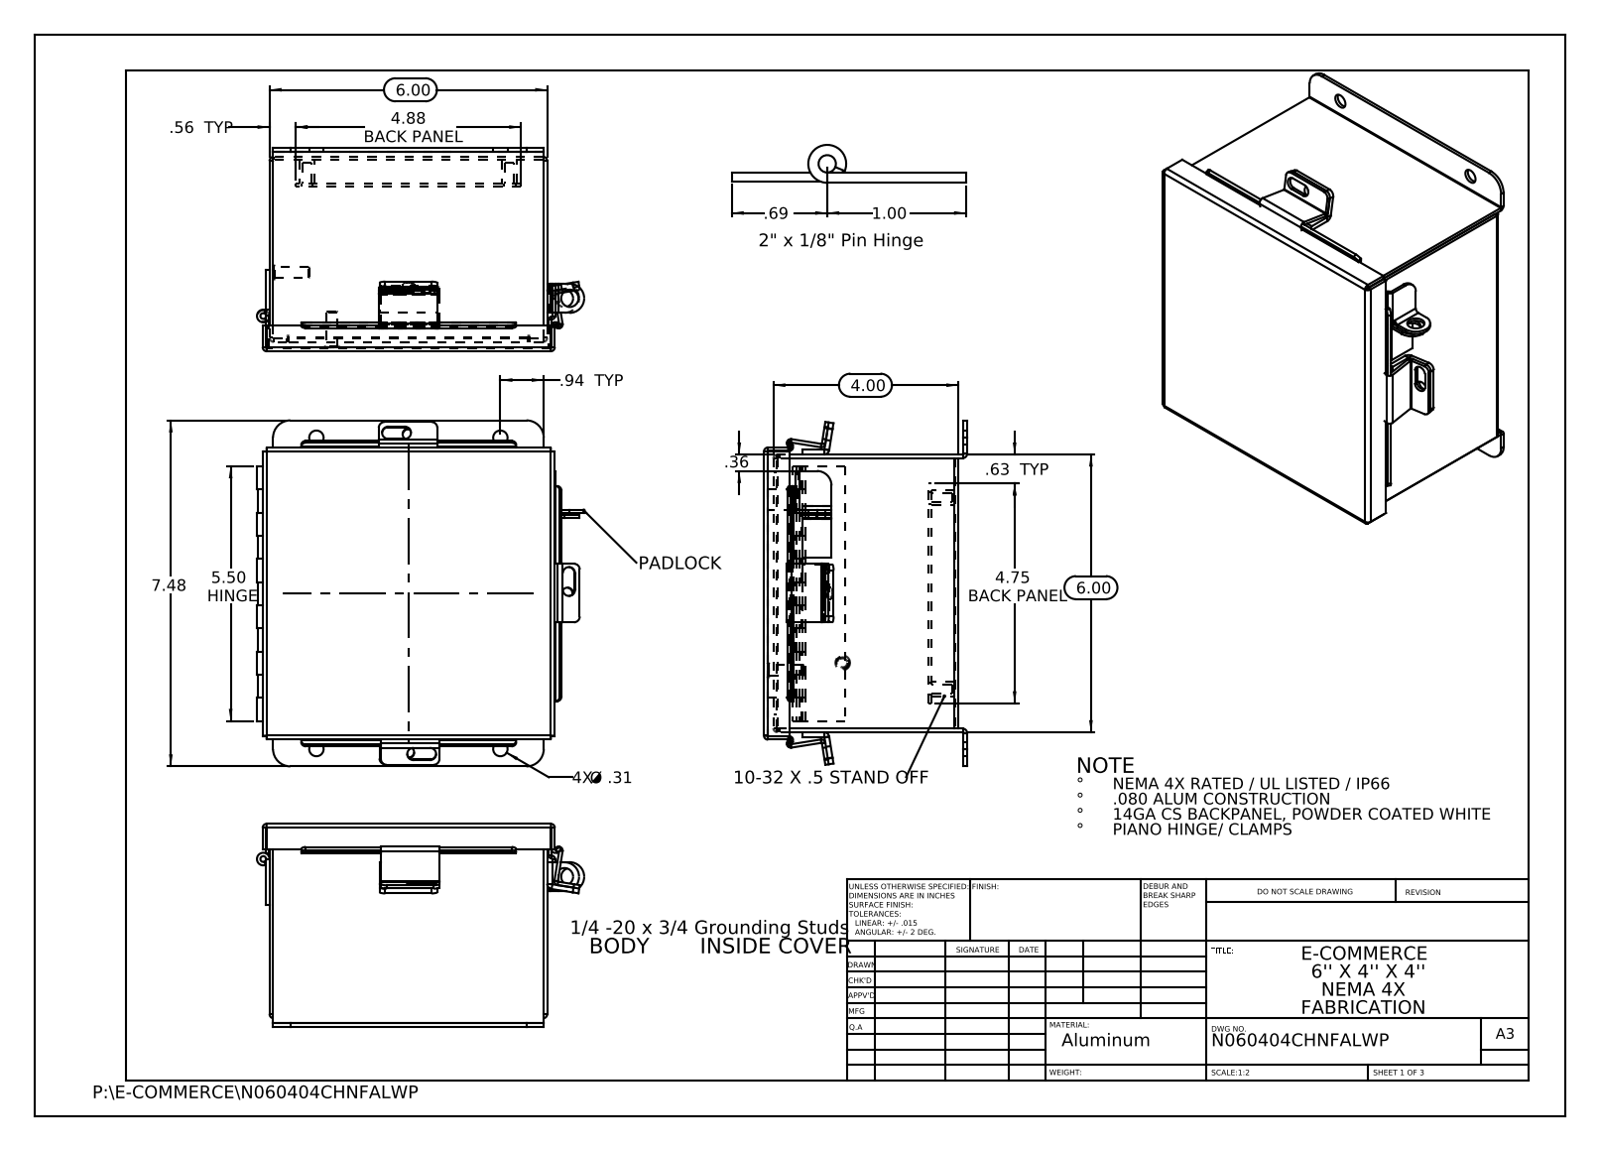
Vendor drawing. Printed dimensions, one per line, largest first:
7.48
6.00
6.00
5.50 HINGE
4.88 BACK PANEL
4.75 BACK PANEL
4.00
1.00
.94 TYP
.69
.63 TYP
.56 TYP
.36
4X Ø .31
